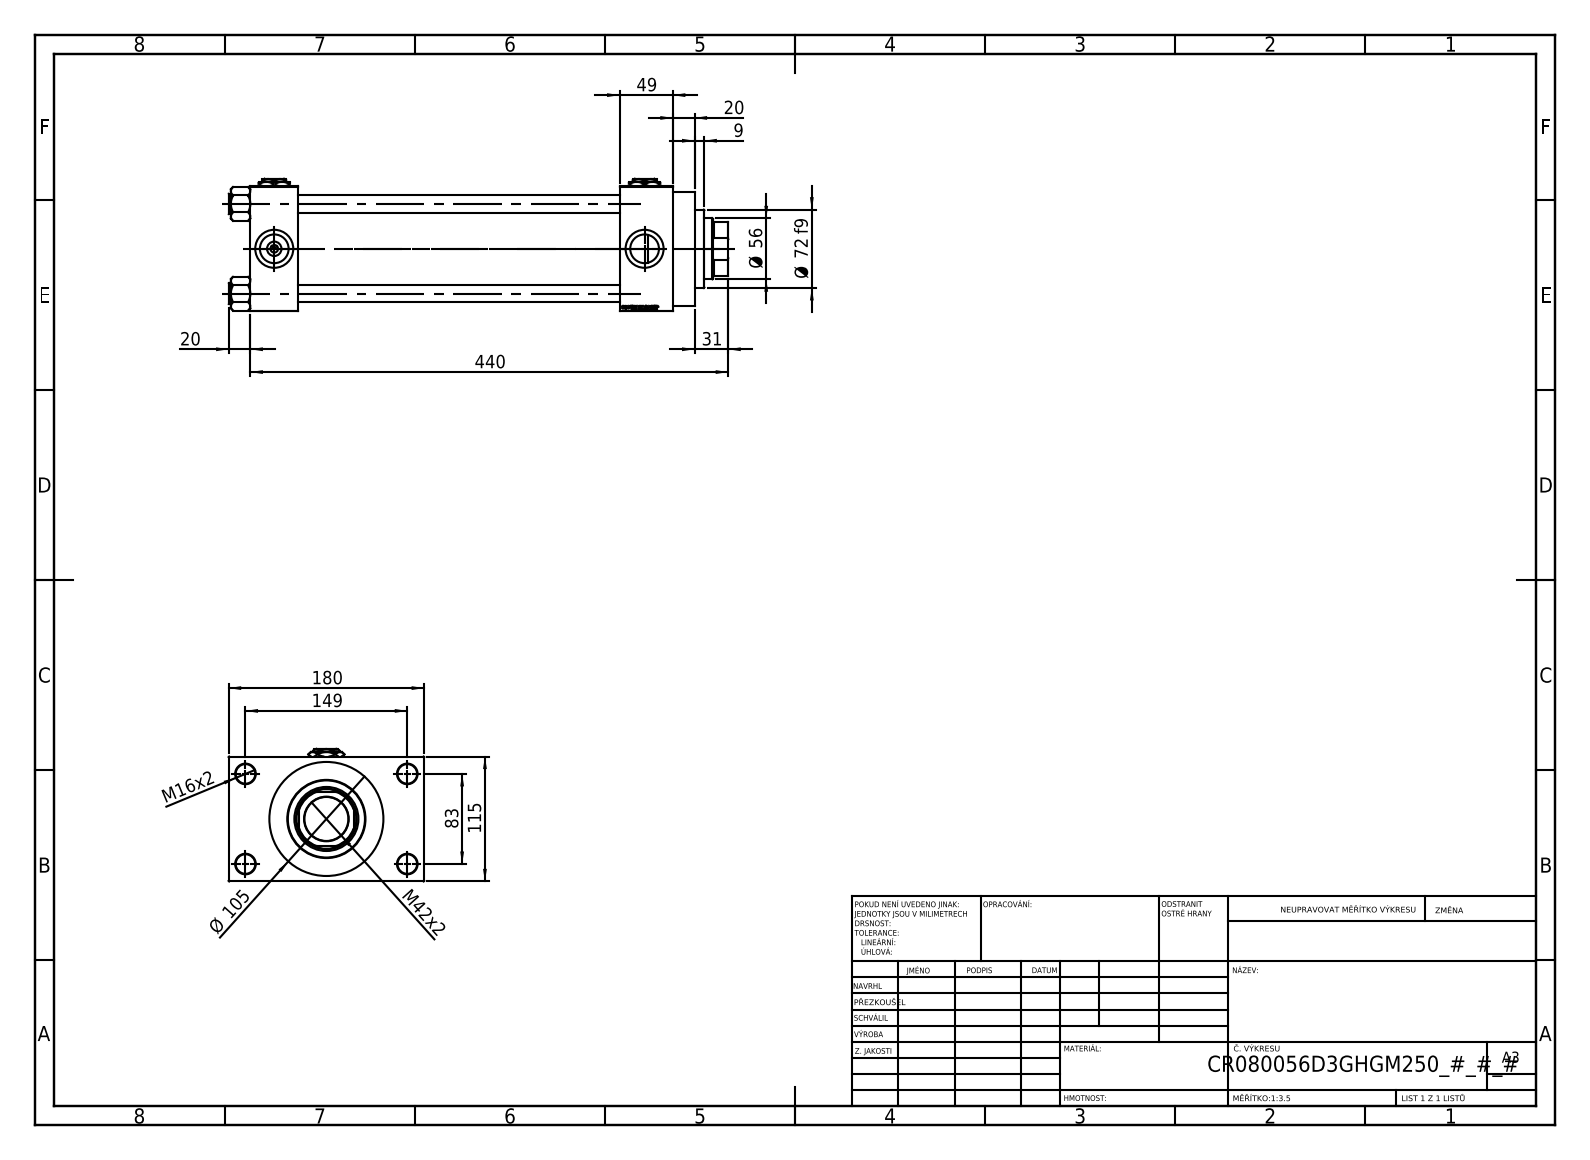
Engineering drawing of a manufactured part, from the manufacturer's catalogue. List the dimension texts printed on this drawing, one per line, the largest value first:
440
180
149
115
Ø 105
83
Ø 72 f9
Ø 56
49
M42x2
31
20
20
M16x2
9
